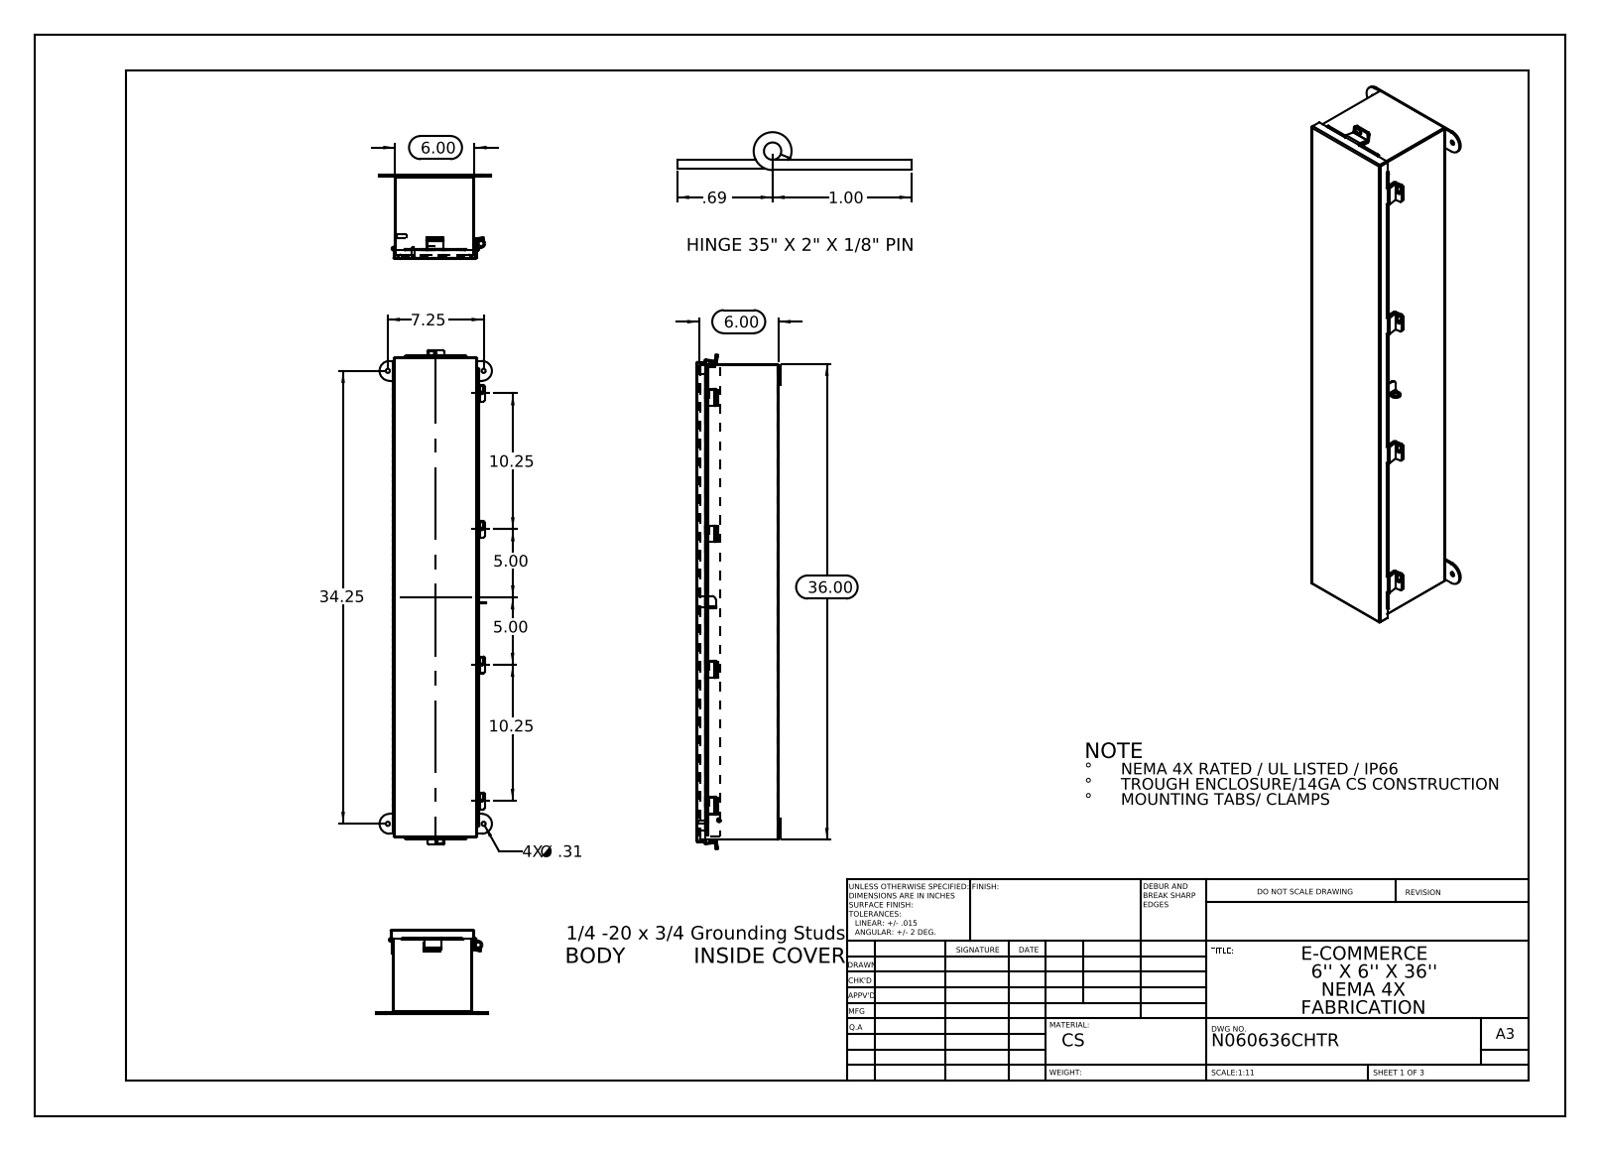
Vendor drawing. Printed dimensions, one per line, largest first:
36.00
34.25
10.25
10.25
7.25
6.00
6.00
5.00
5.00
1.00
.69
4X Ø .31
